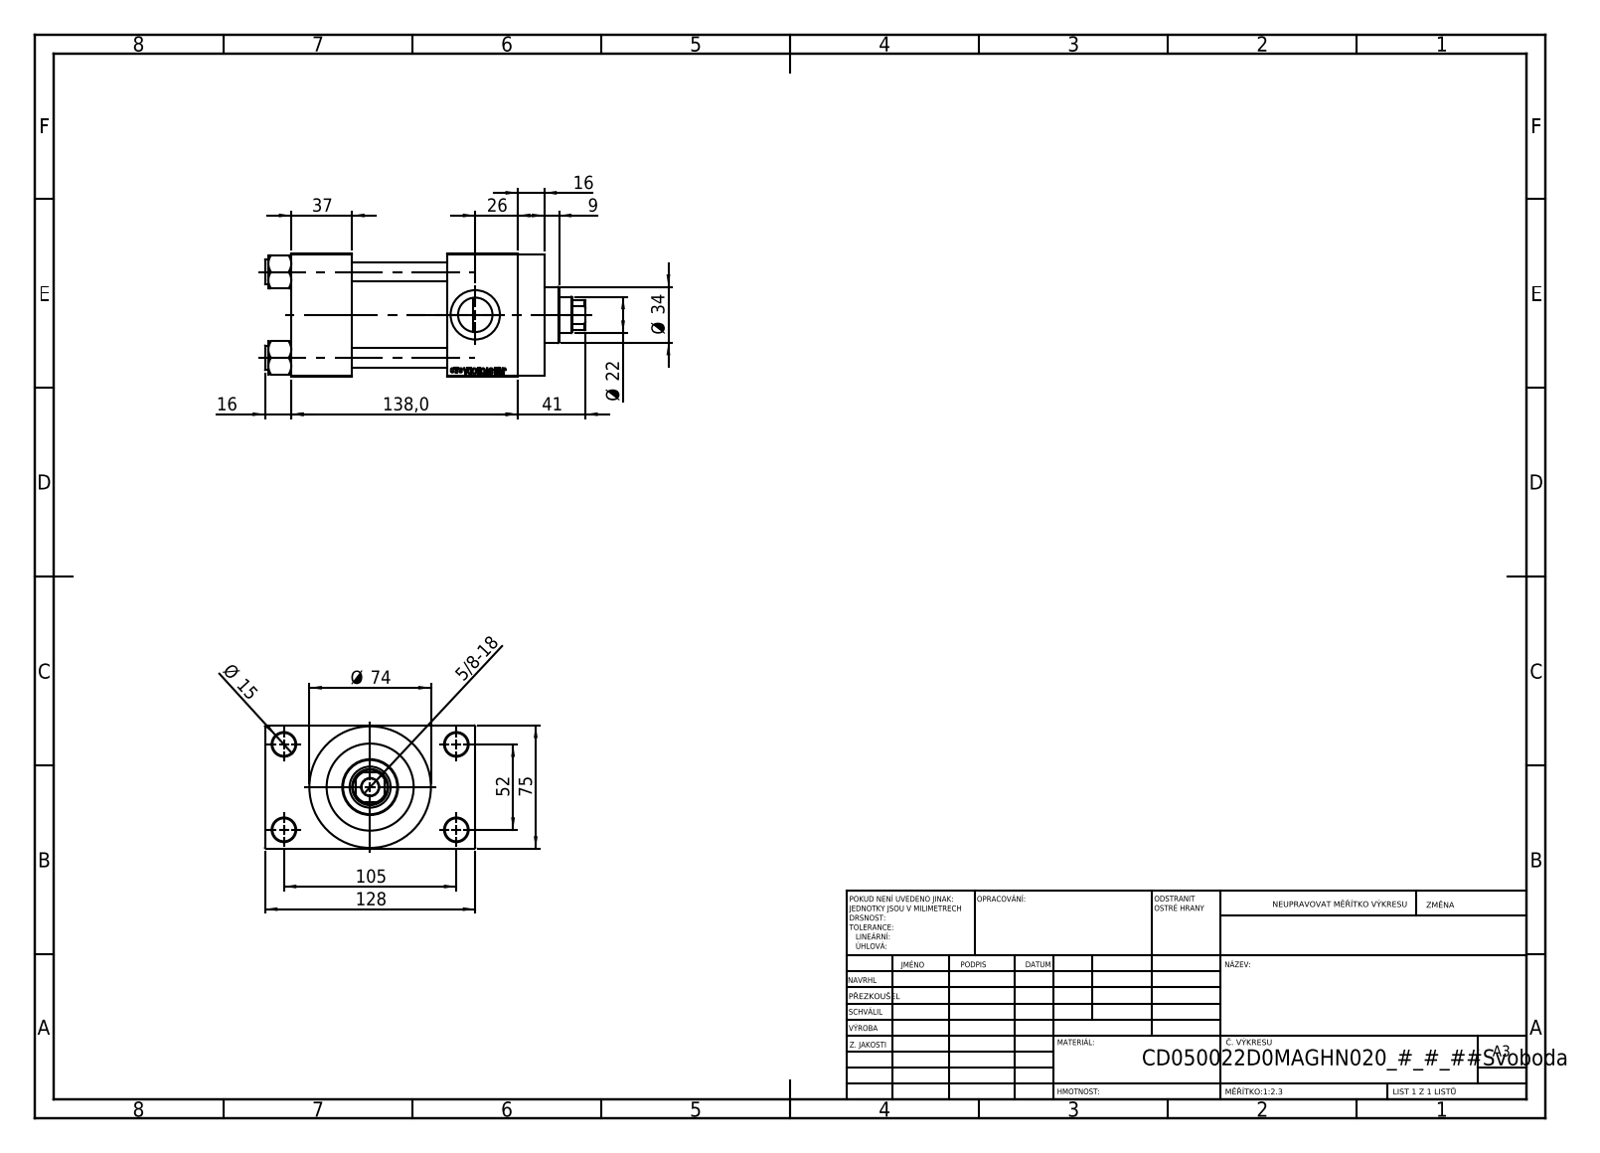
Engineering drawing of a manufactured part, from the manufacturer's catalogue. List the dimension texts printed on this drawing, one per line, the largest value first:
138,0
128
105
75
Ø 74
52
41
37
Ø 34
26
Ø 22
16
16
Ø 15
9
5/8-18
